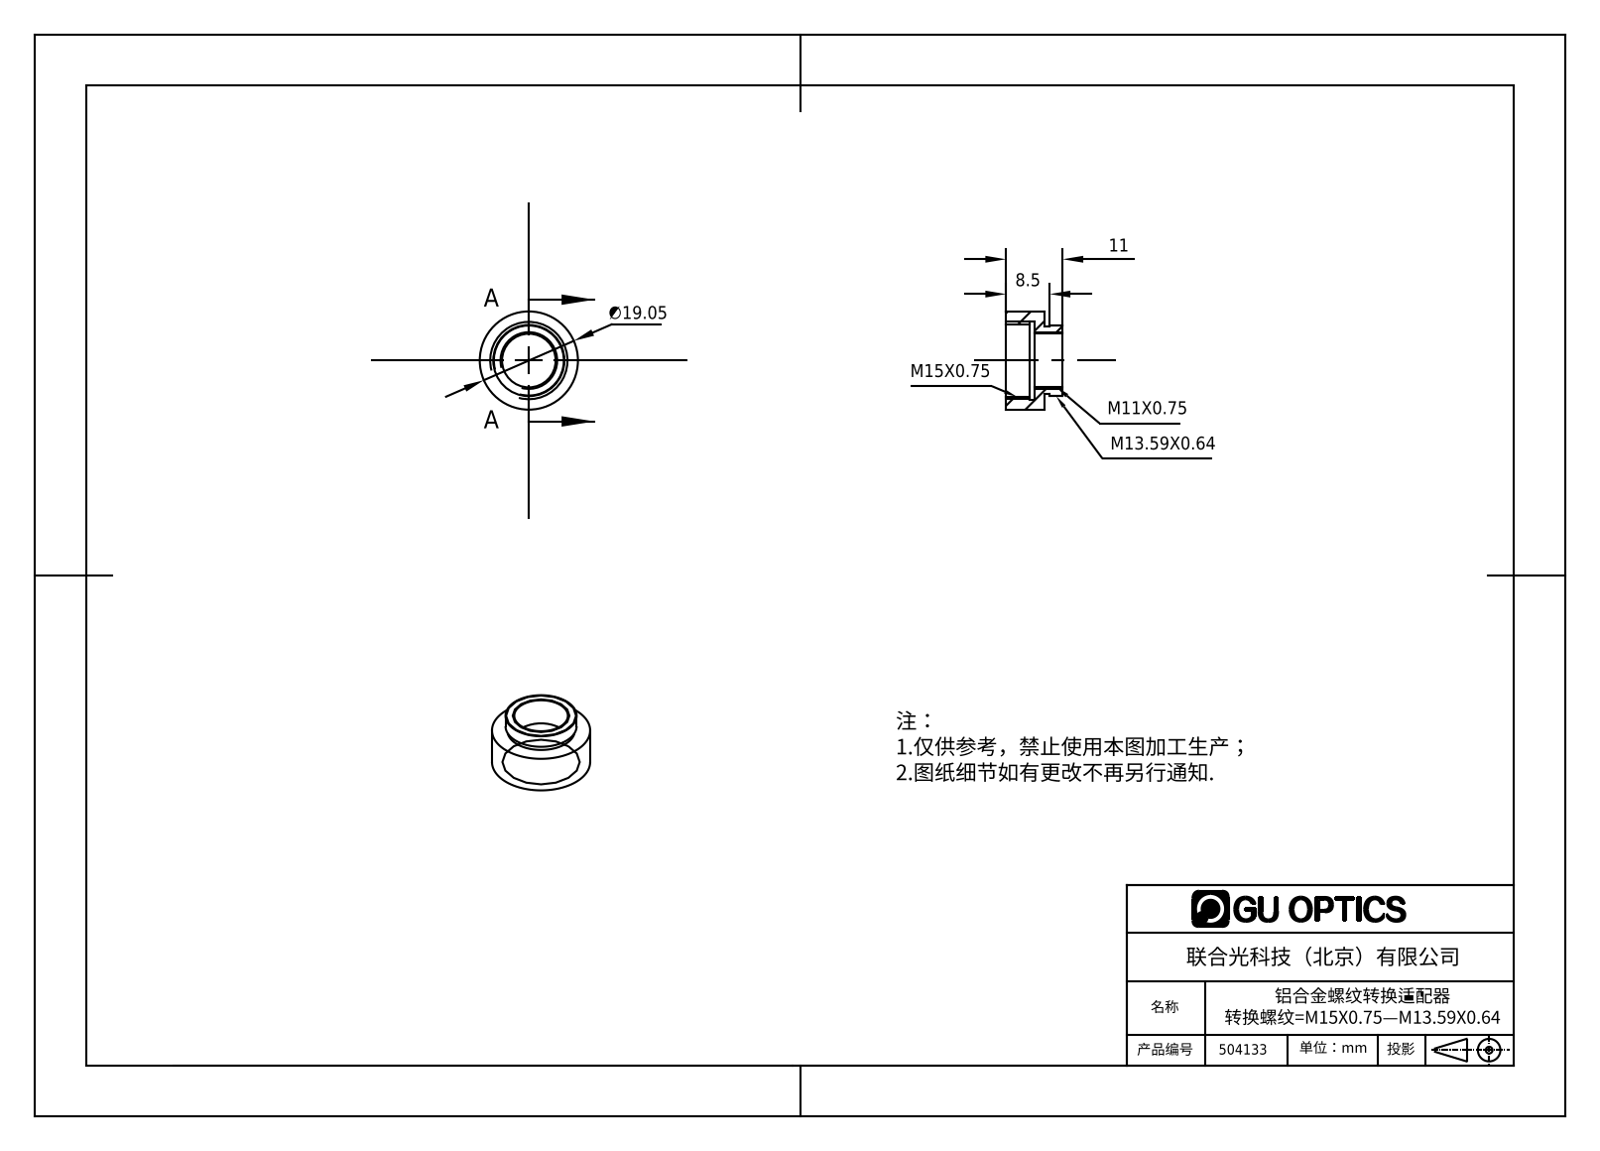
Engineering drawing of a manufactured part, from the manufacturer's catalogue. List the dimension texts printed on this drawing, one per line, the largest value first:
∅19.05
11
8.5
